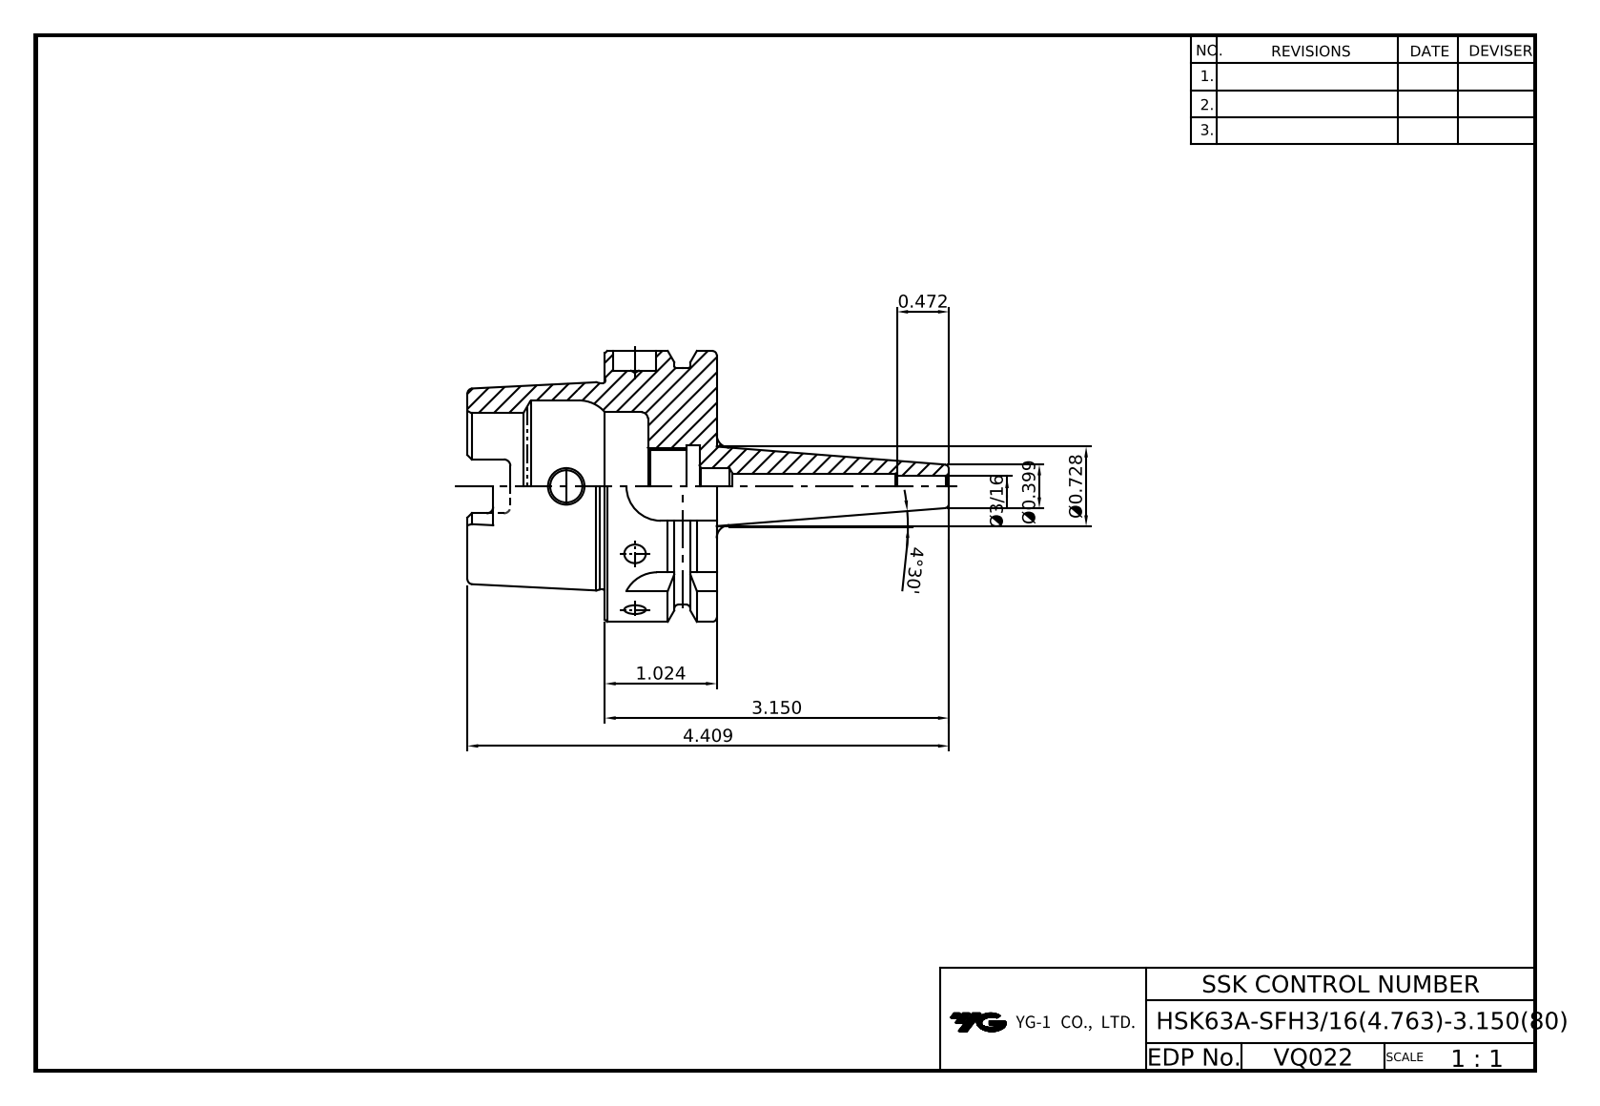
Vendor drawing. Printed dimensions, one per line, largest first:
4.409
4°30'
3.150
1.024
Ø0.728
0.472
Ø0.399
